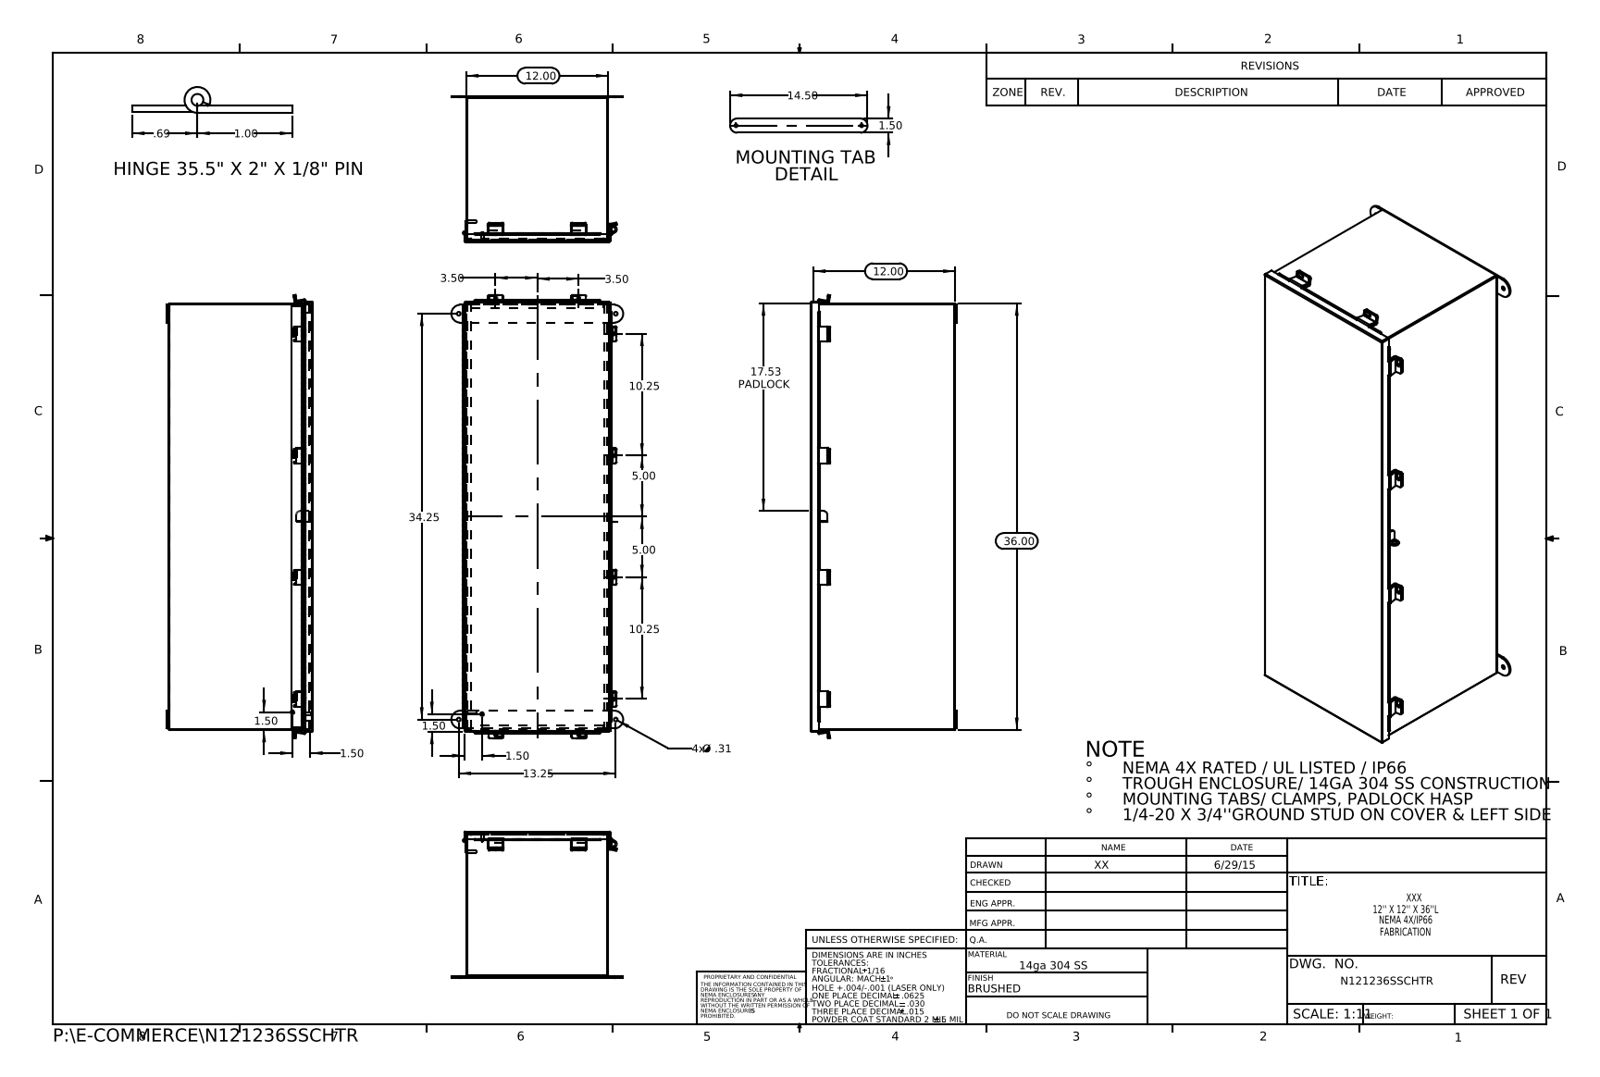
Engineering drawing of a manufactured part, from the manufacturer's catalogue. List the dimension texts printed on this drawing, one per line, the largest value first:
36.00
34.25
17.53 PADLOCK
14.50
13.25
12.00
12.00
10.25
10.25
5.00
5.00
3.50
3.50
1.50
1.50
1.50
1.50
1.50
1.00
.69
4x Ø .31
